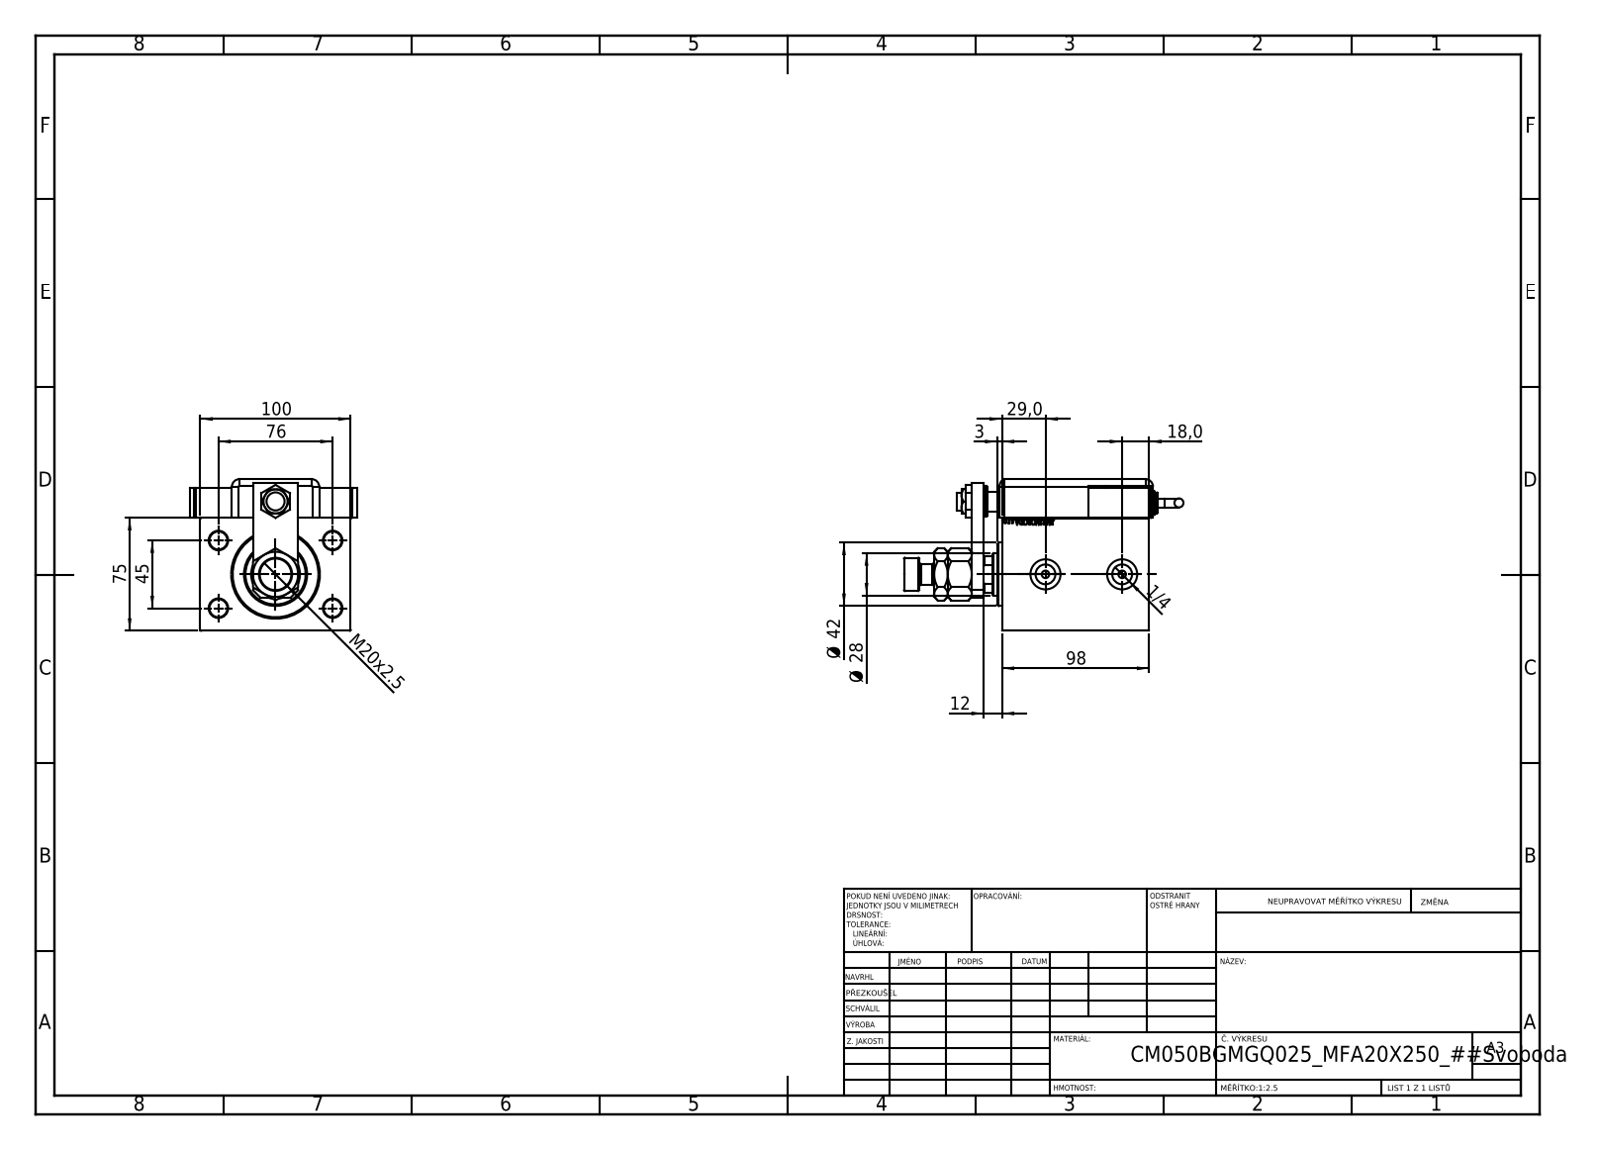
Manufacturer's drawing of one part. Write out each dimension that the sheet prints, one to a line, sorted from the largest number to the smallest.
100
98
76
75
45
Ø 42
29,0
Ø 28
M20x2.5
18,0
12
3
1/4
